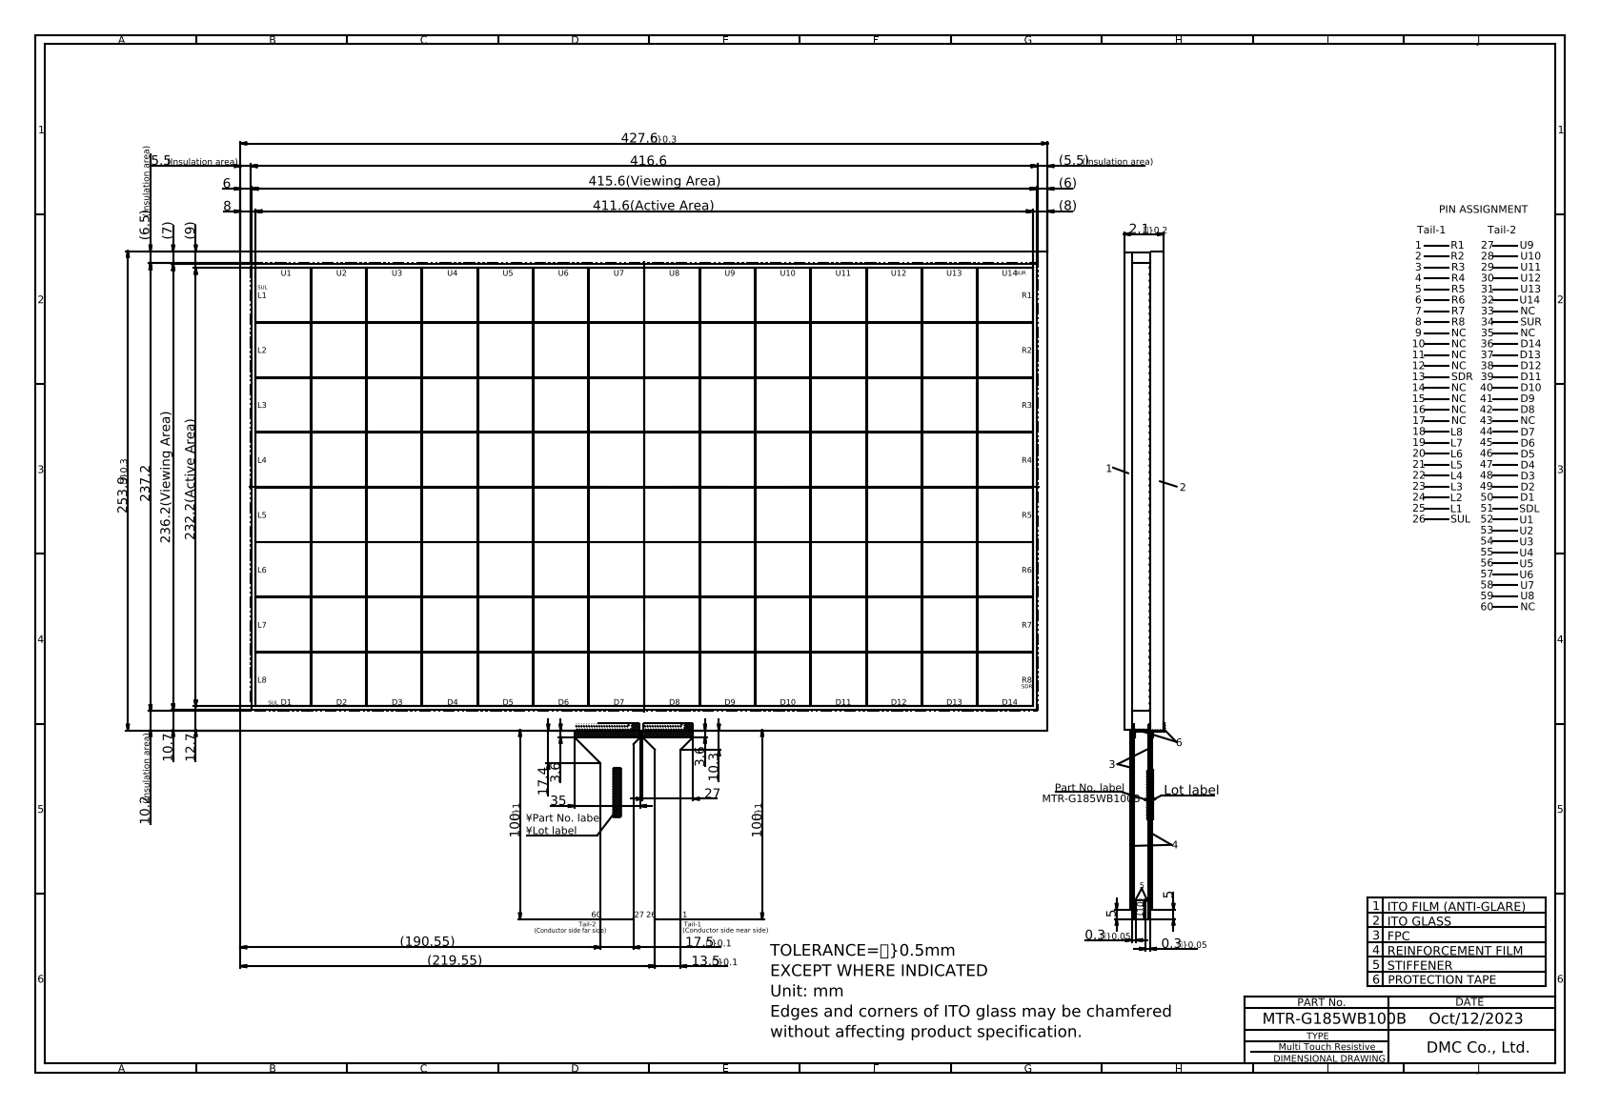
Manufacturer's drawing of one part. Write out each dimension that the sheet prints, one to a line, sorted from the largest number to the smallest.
427.60
416.6
415.6(Viewing Area)
411.6(Active Area)
253.90
237.2
236.2(Viewing Area)
232.2(Active Area)
(219.55)
(190.55)
100.00
100.00
35
27
17.50
17.4
13.50
12.7
10.7
10.3
10.20{\H0.6667x;(Insulation area)}
(10)
(9)
(8)
8
(7)
(6.50){\H0.6667x;(Insulation area)}
(6)
6
(5.50){\H0.6667x;(Insulation area)}
5.50{\H0.6667x;(Insulation area)}
5
5
3.6
3.6
2.1{\H0.6667x;?}0.2}
0.3{\H0.6667x;?}0.05}
0.3{\H0.6667x;?}0.05}
